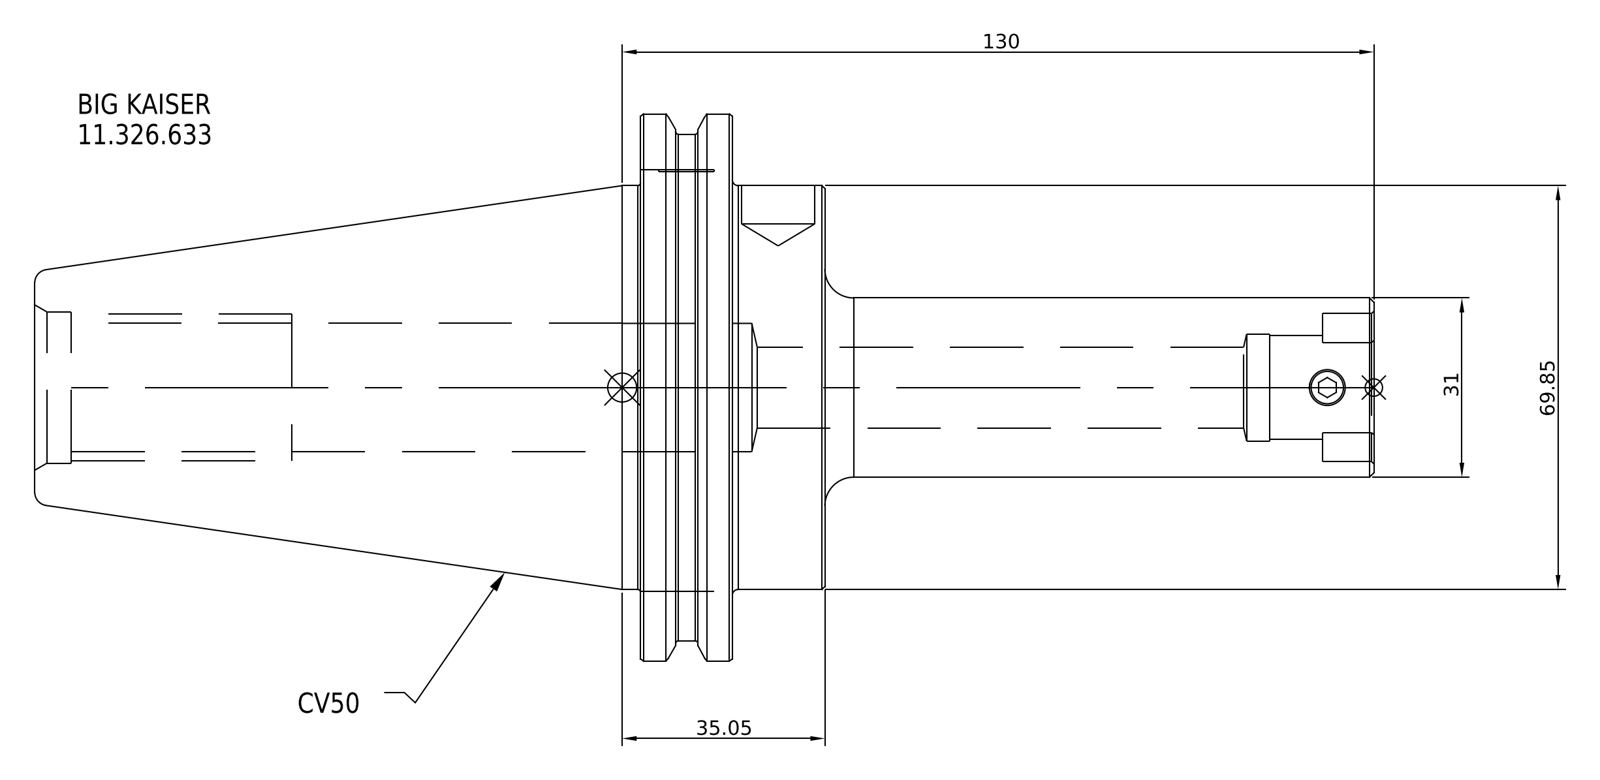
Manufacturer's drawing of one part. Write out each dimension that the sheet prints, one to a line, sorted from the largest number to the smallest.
130
69.85
35.05
31
